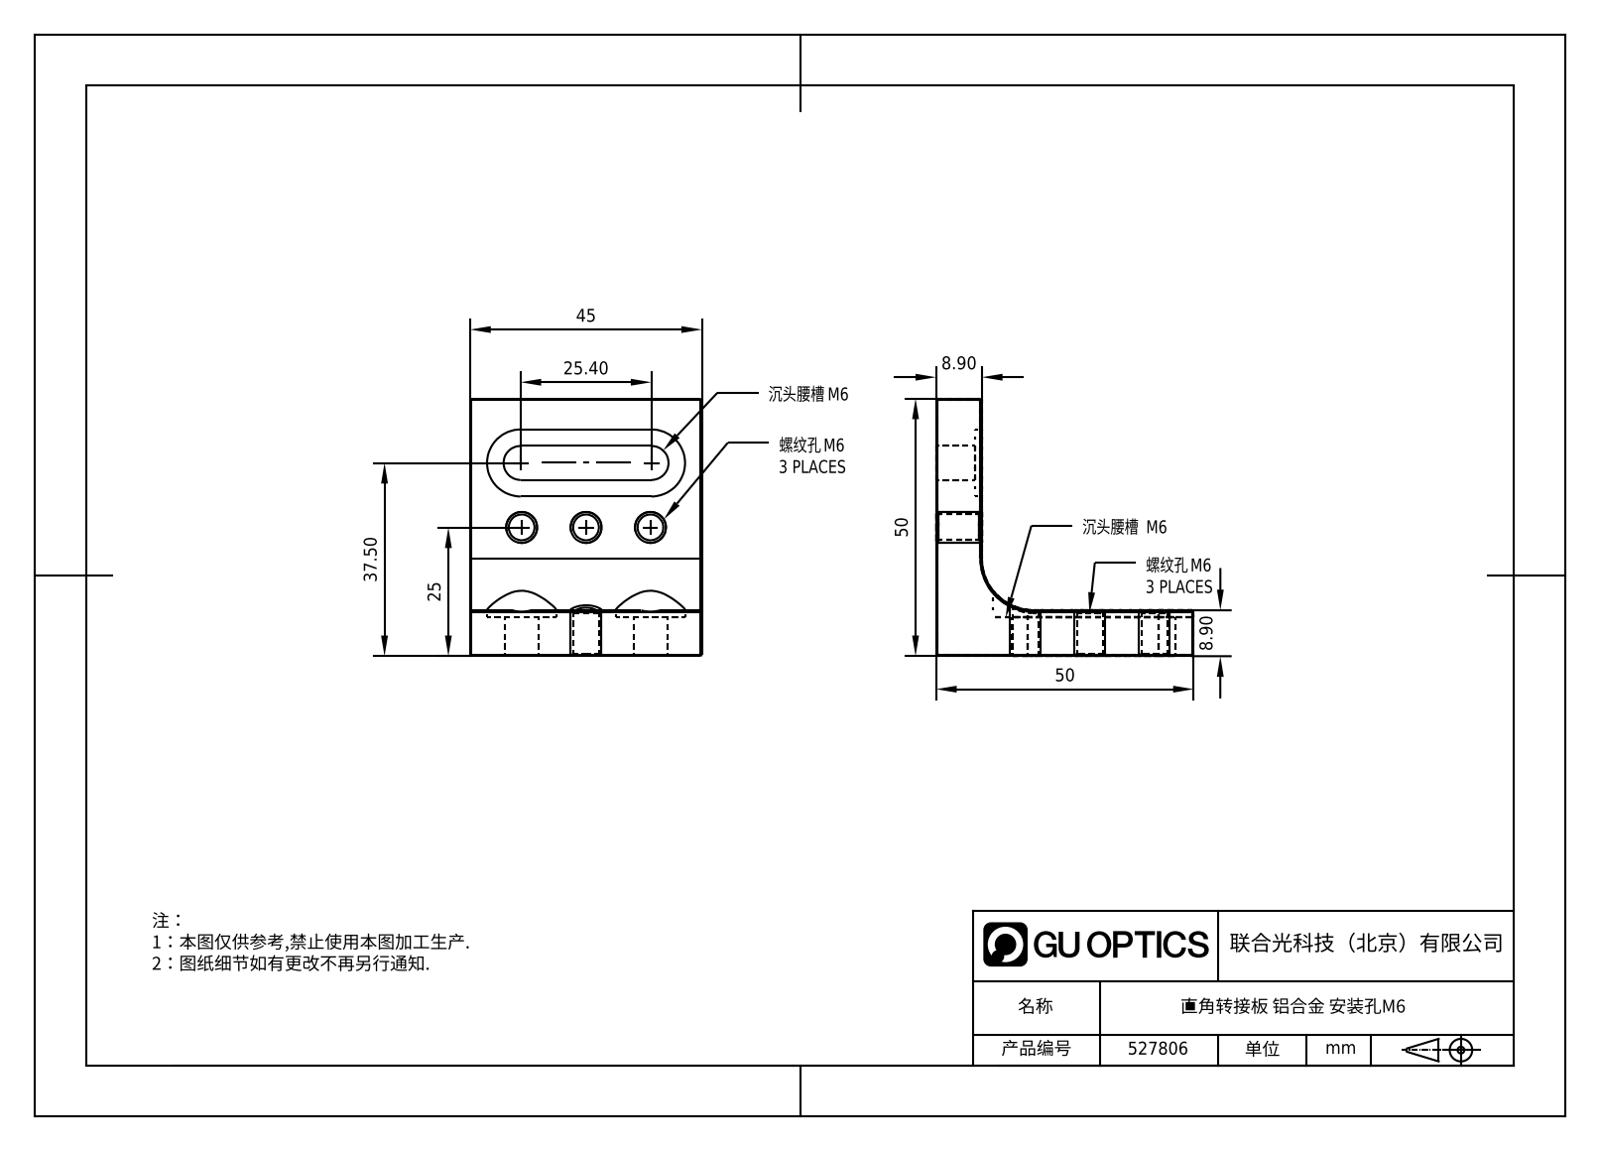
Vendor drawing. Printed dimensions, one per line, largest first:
50
50
45
37.50
25.40
25
8.90
8.90
